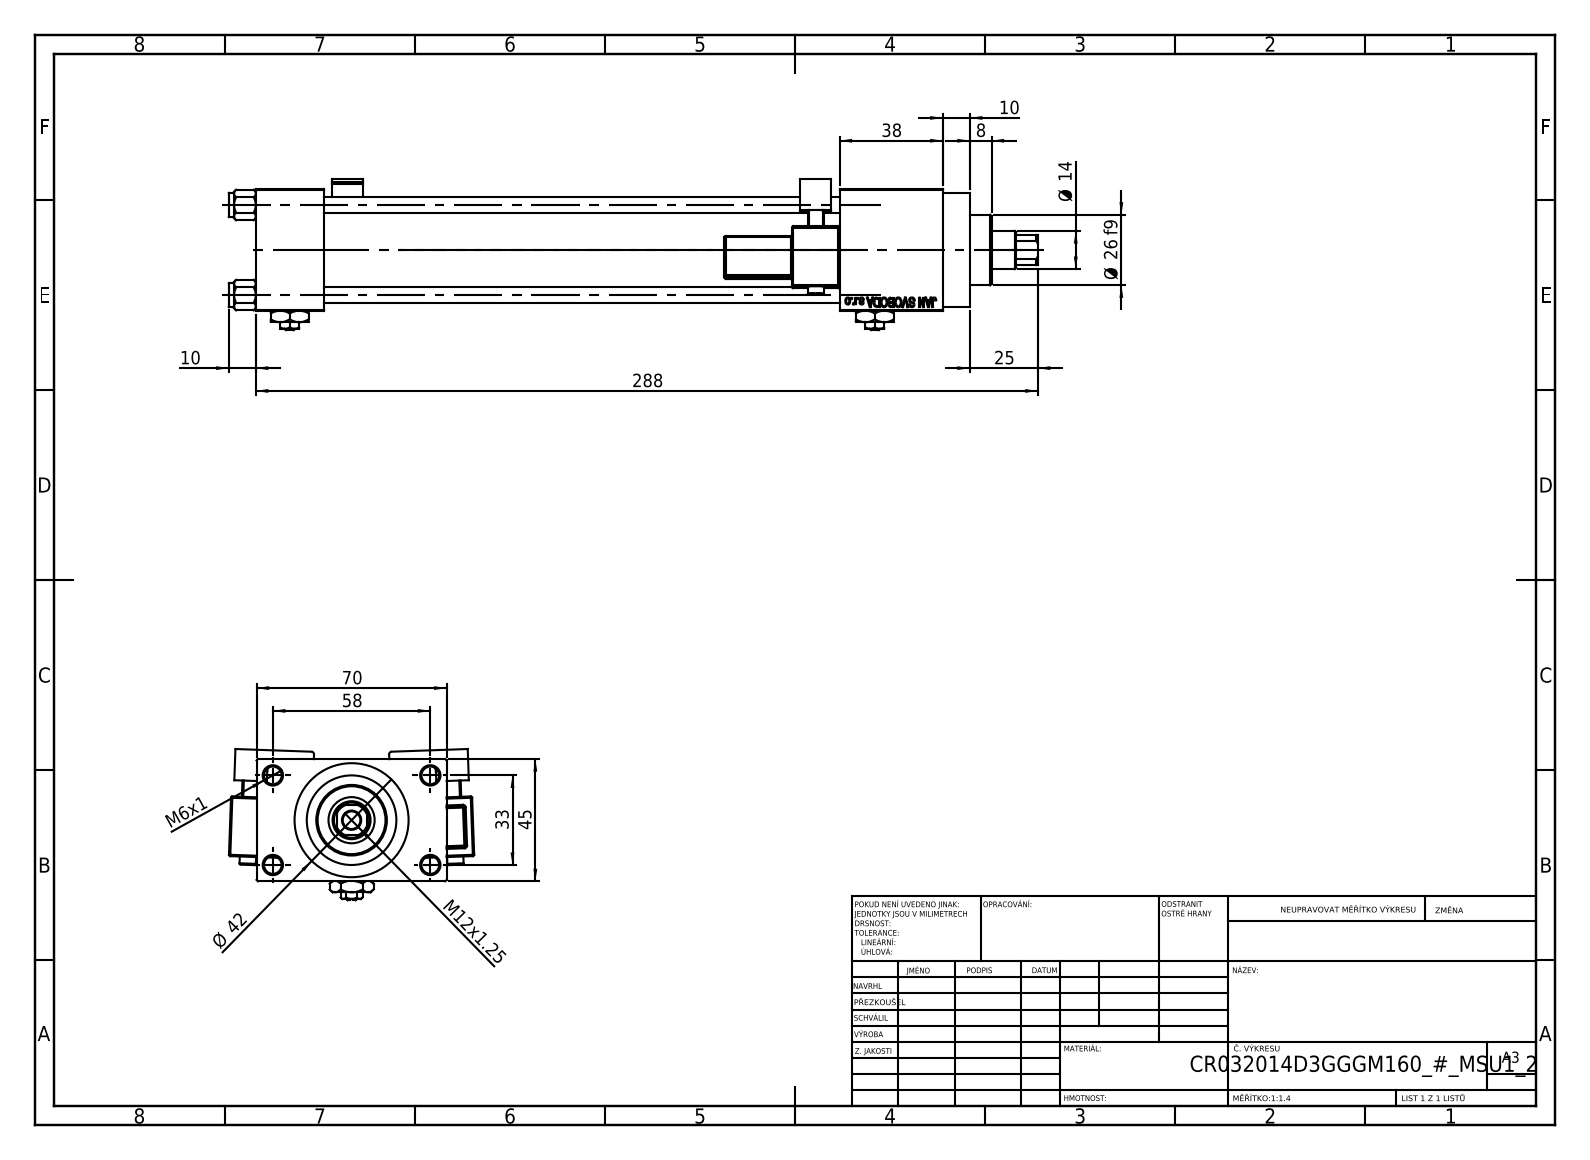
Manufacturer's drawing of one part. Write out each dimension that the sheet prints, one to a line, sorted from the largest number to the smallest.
288
70
58
45
Ø 42
38
33
Ø 26 f9
25
Ø 14
M12x1.25
10
10
8
M6x1
